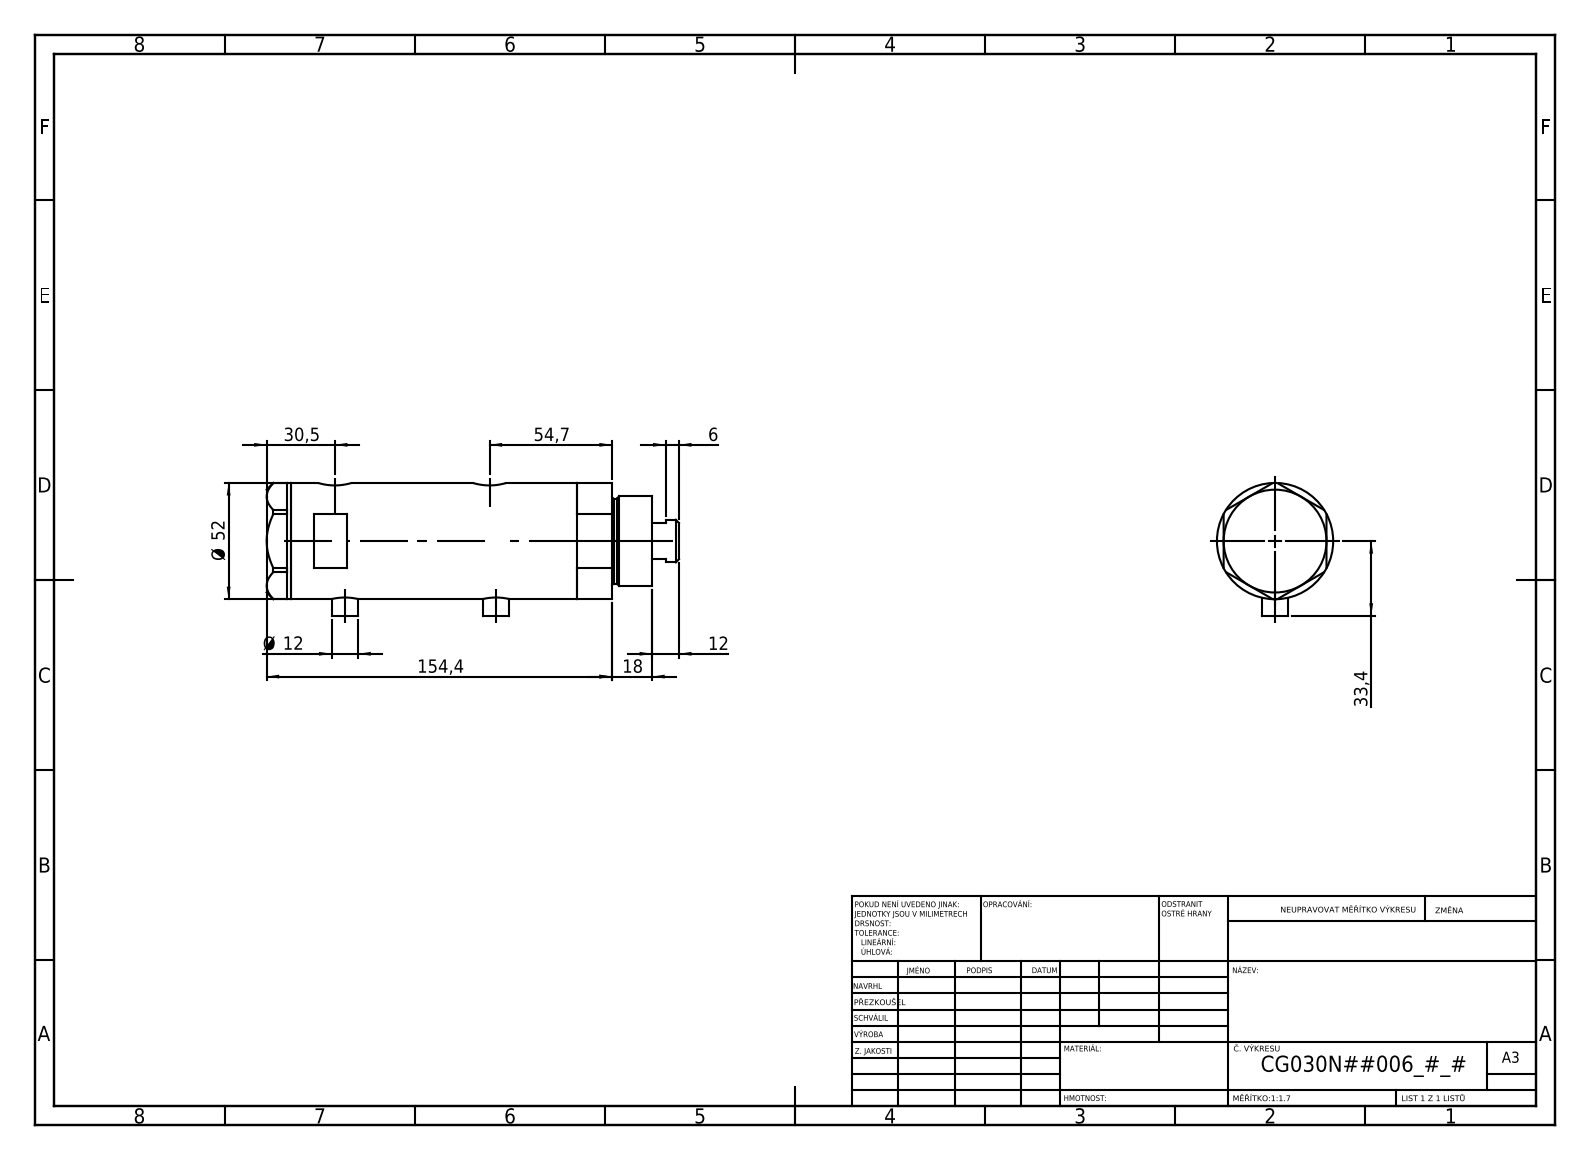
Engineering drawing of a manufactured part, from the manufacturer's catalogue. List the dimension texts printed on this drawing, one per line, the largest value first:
154,4
54,7
Ø 52
33,4
30,5
18
12
Ø 12
6
